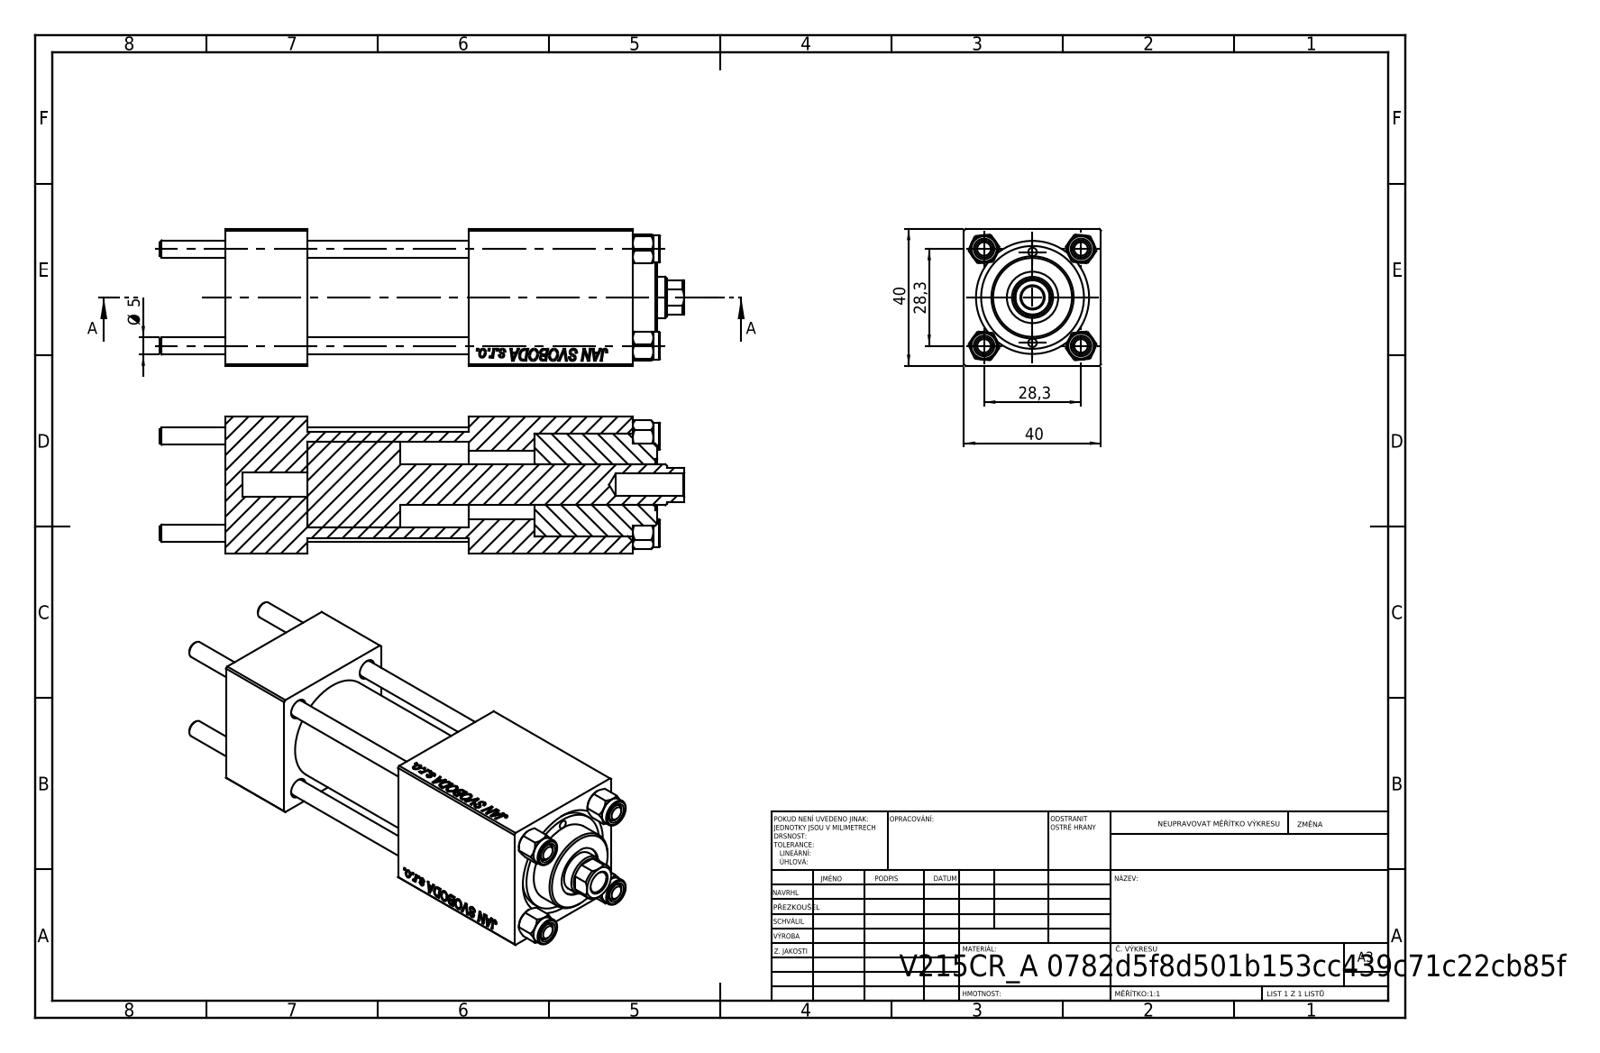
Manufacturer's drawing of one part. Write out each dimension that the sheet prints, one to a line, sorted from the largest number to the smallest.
40
40
28,3
28,3
Ø 5
